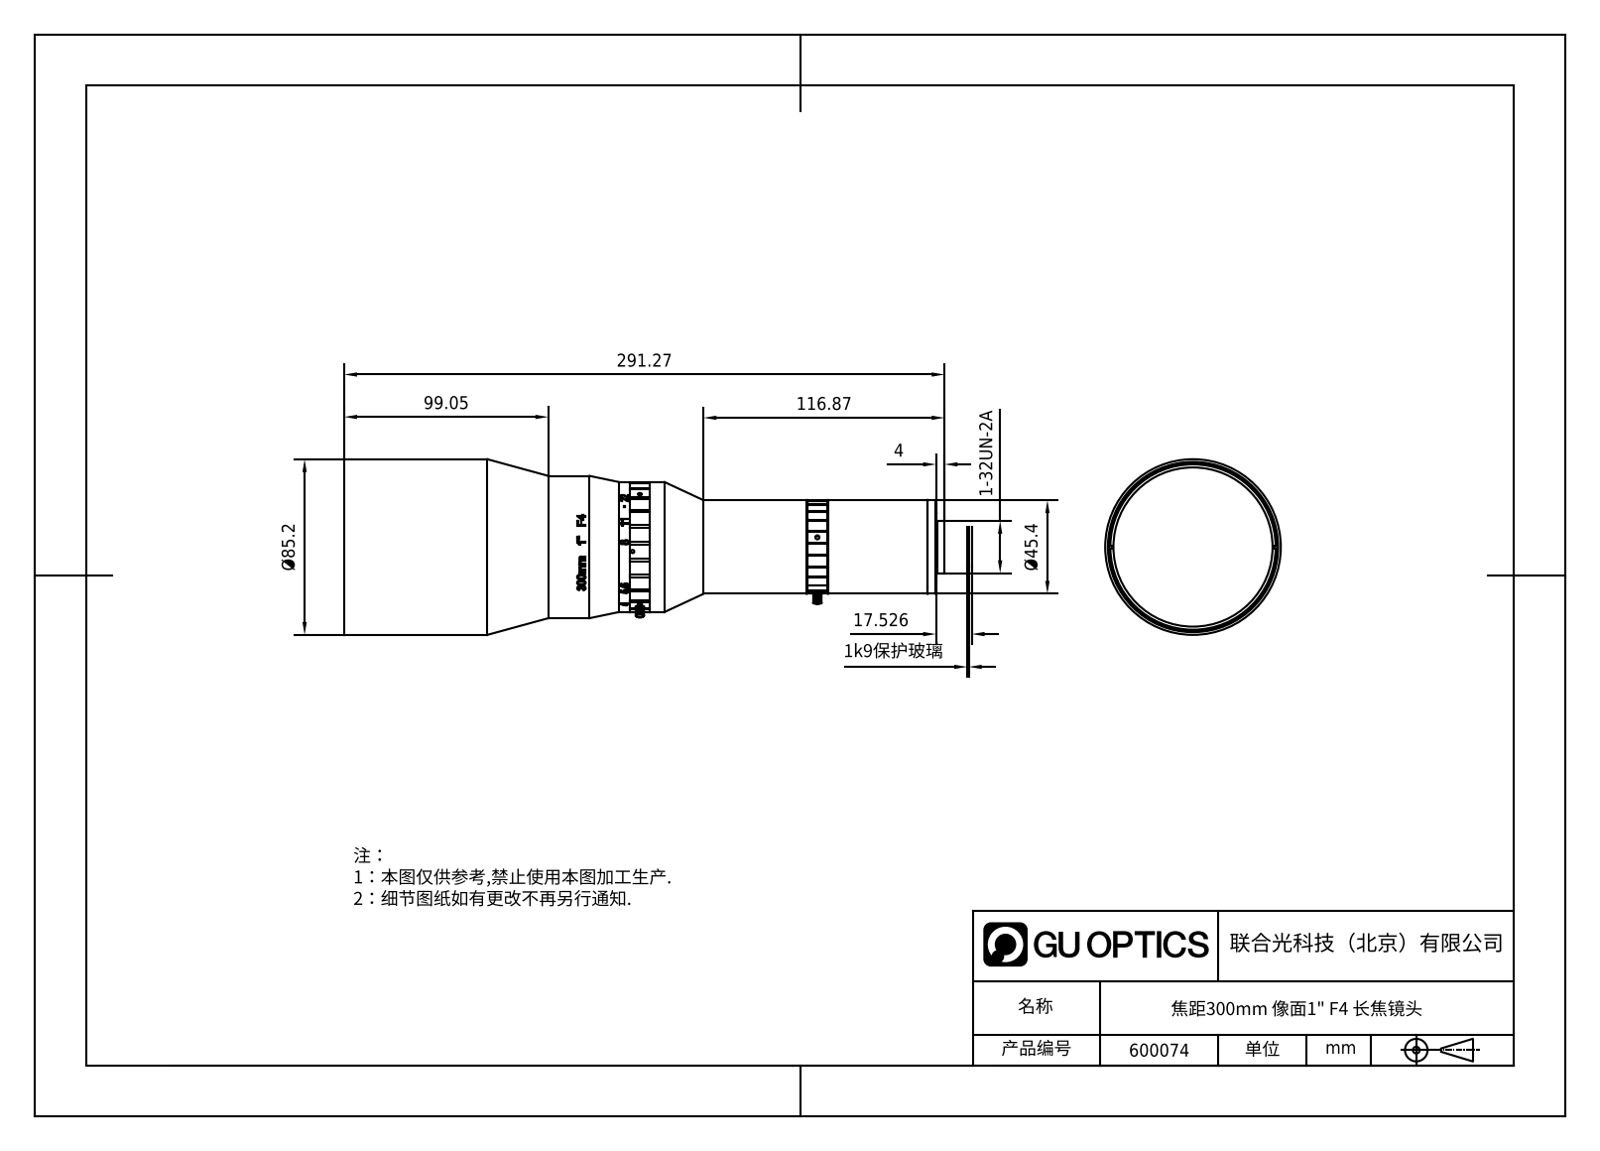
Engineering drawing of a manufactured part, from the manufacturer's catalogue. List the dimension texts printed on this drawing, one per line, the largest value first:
291.27
116.87
99.05
Ø85.2
Ø45.4
17.526
4
1-32UN-2A
1k9保护玻璃
